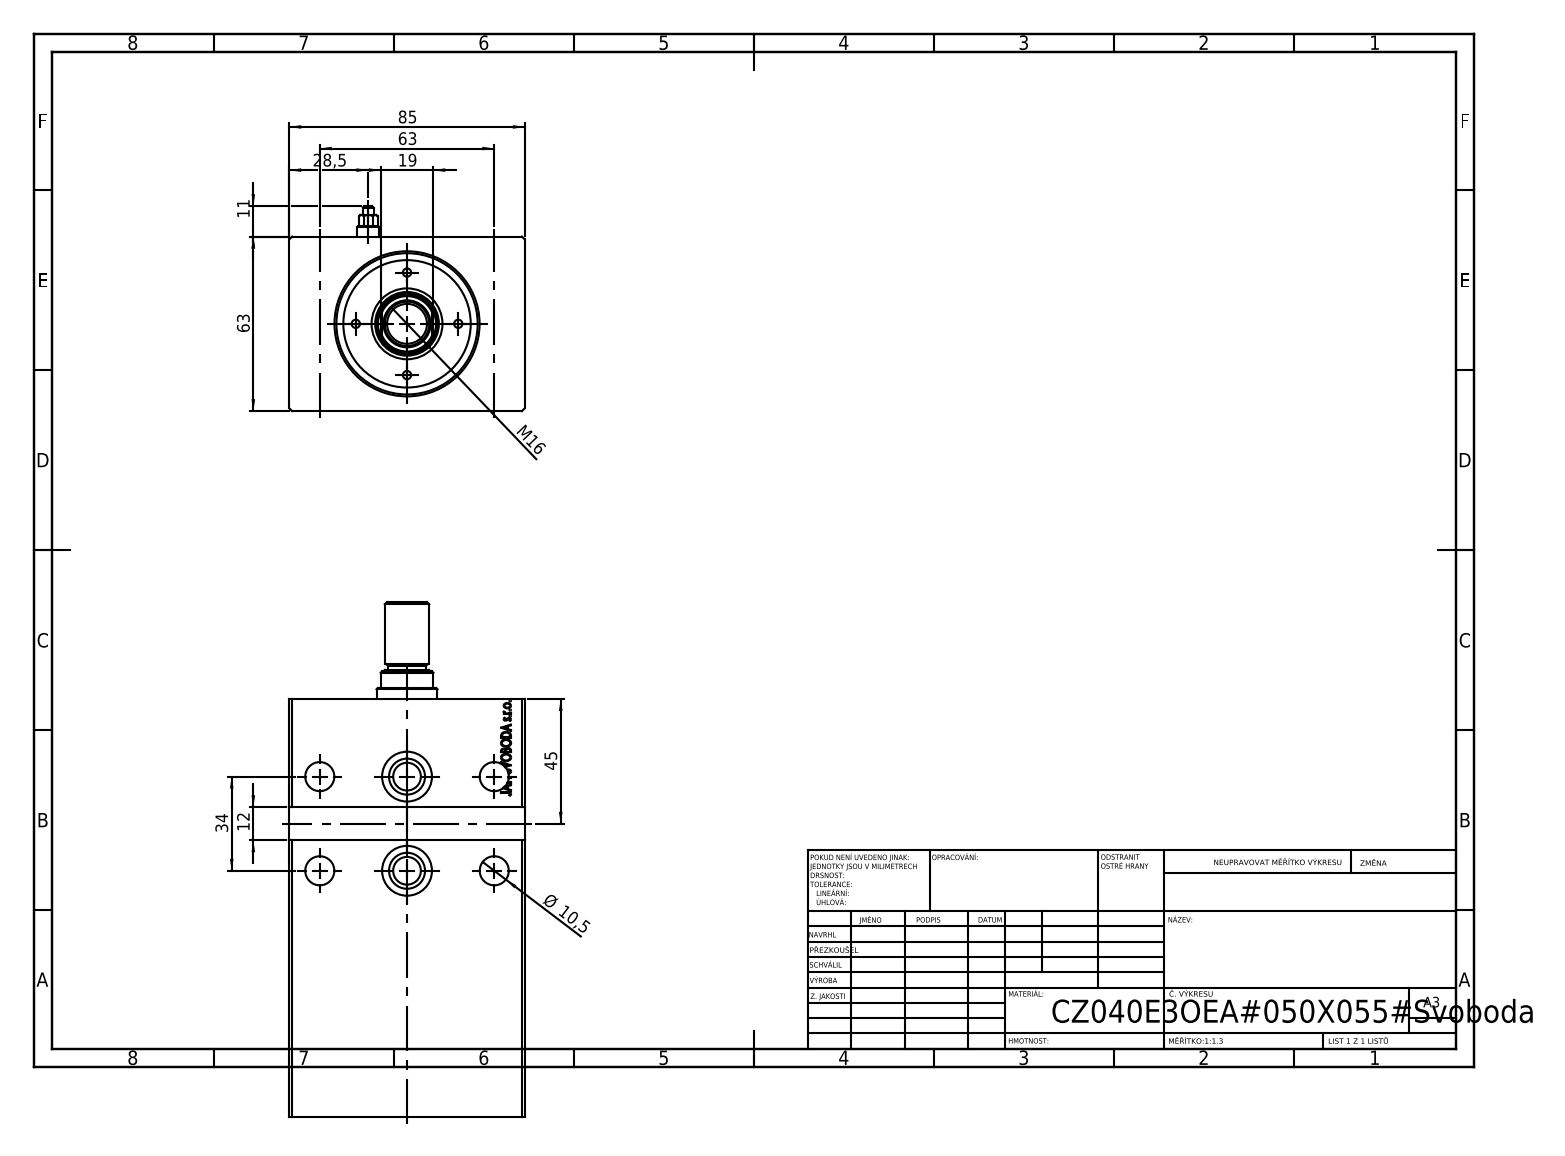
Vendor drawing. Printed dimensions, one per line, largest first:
85
63
63
45
34
28,5
19
M16
12
11
Ø 10,5
